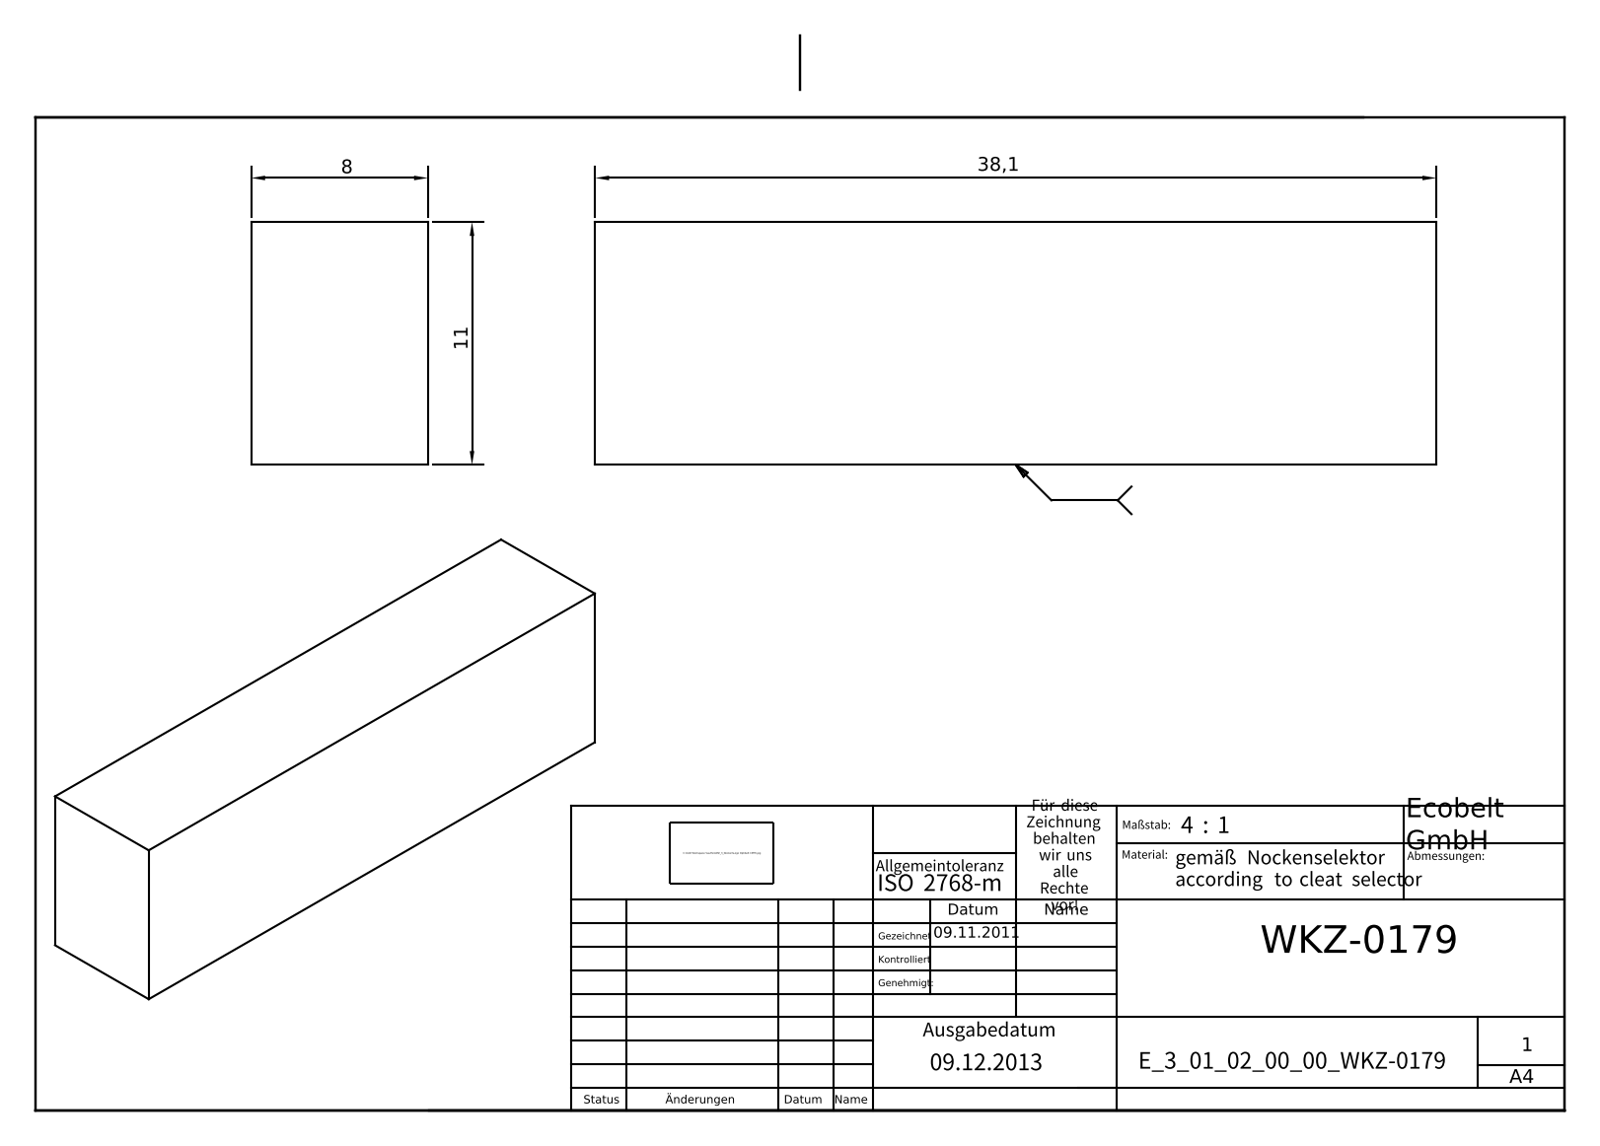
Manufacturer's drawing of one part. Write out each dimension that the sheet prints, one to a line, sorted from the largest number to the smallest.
38,1
11
8
